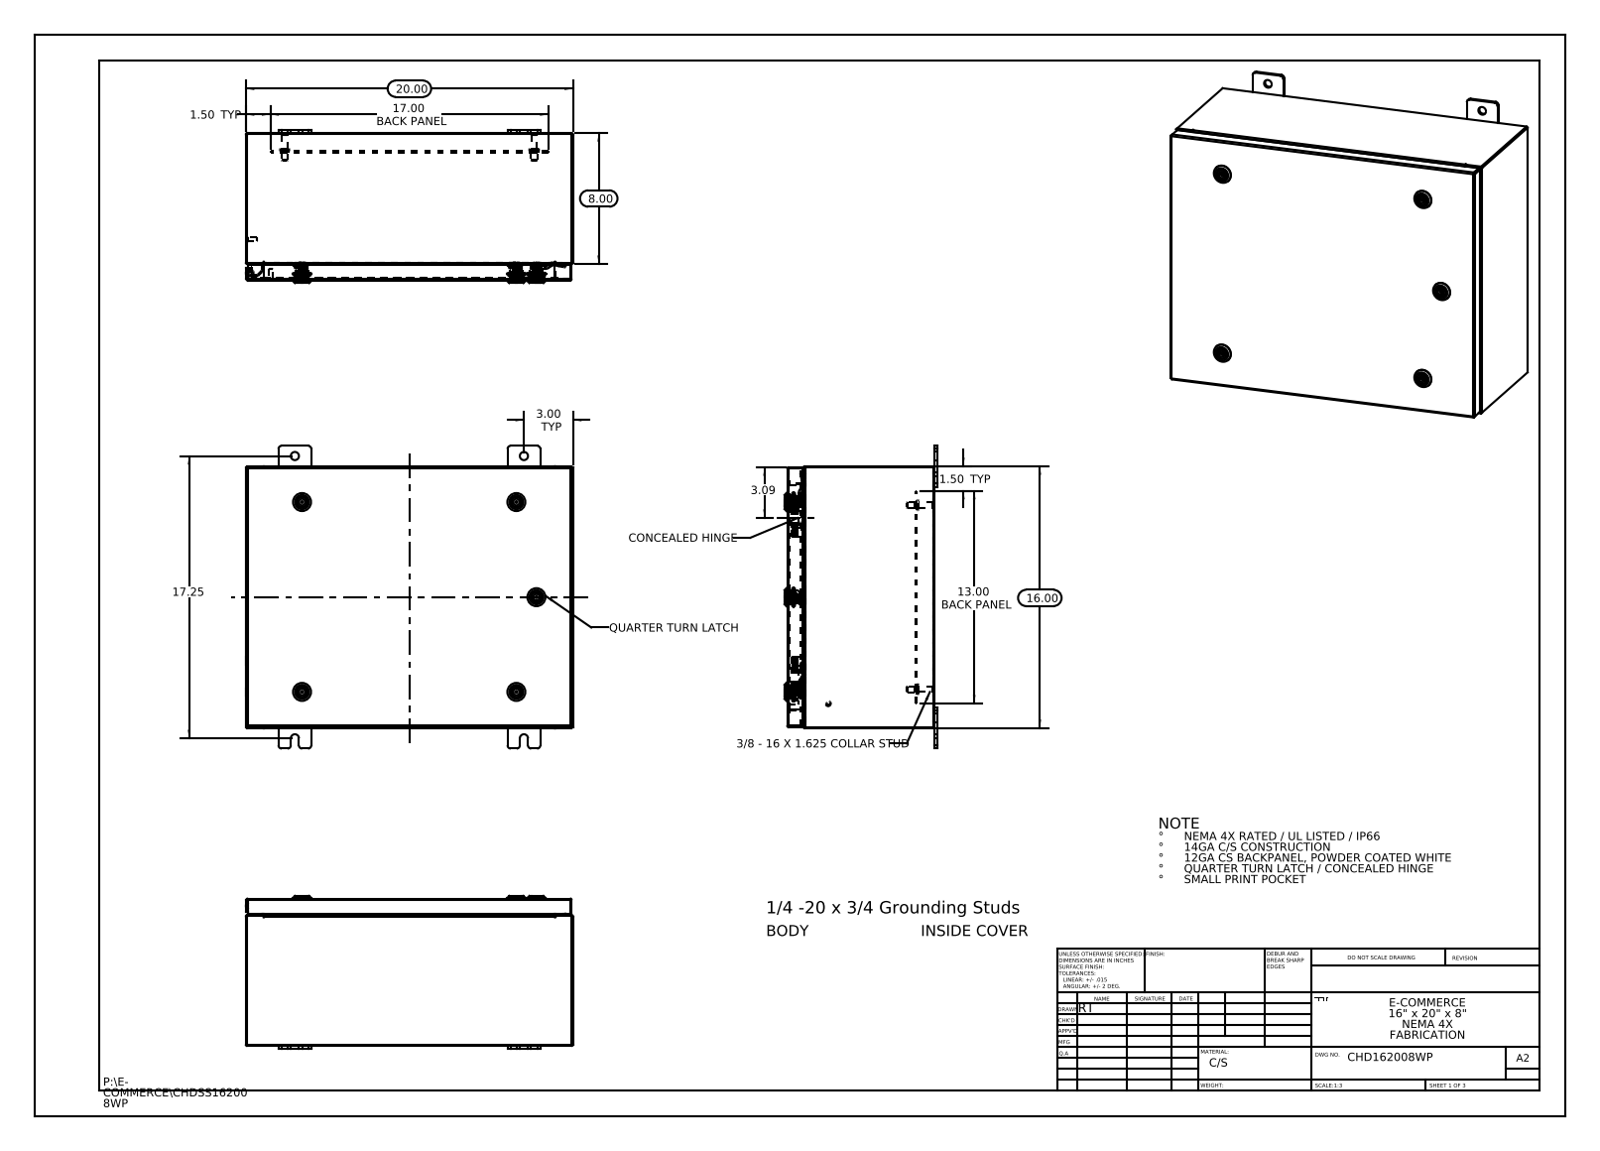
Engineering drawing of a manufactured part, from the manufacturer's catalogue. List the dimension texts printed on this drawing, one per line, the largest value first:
20.00
17.25
17.00 BACK PANEL
16.00
13.00 BACK PANEL
8.00
3.09
3.00 TYP
1.50 TYP
1.50 TYP
